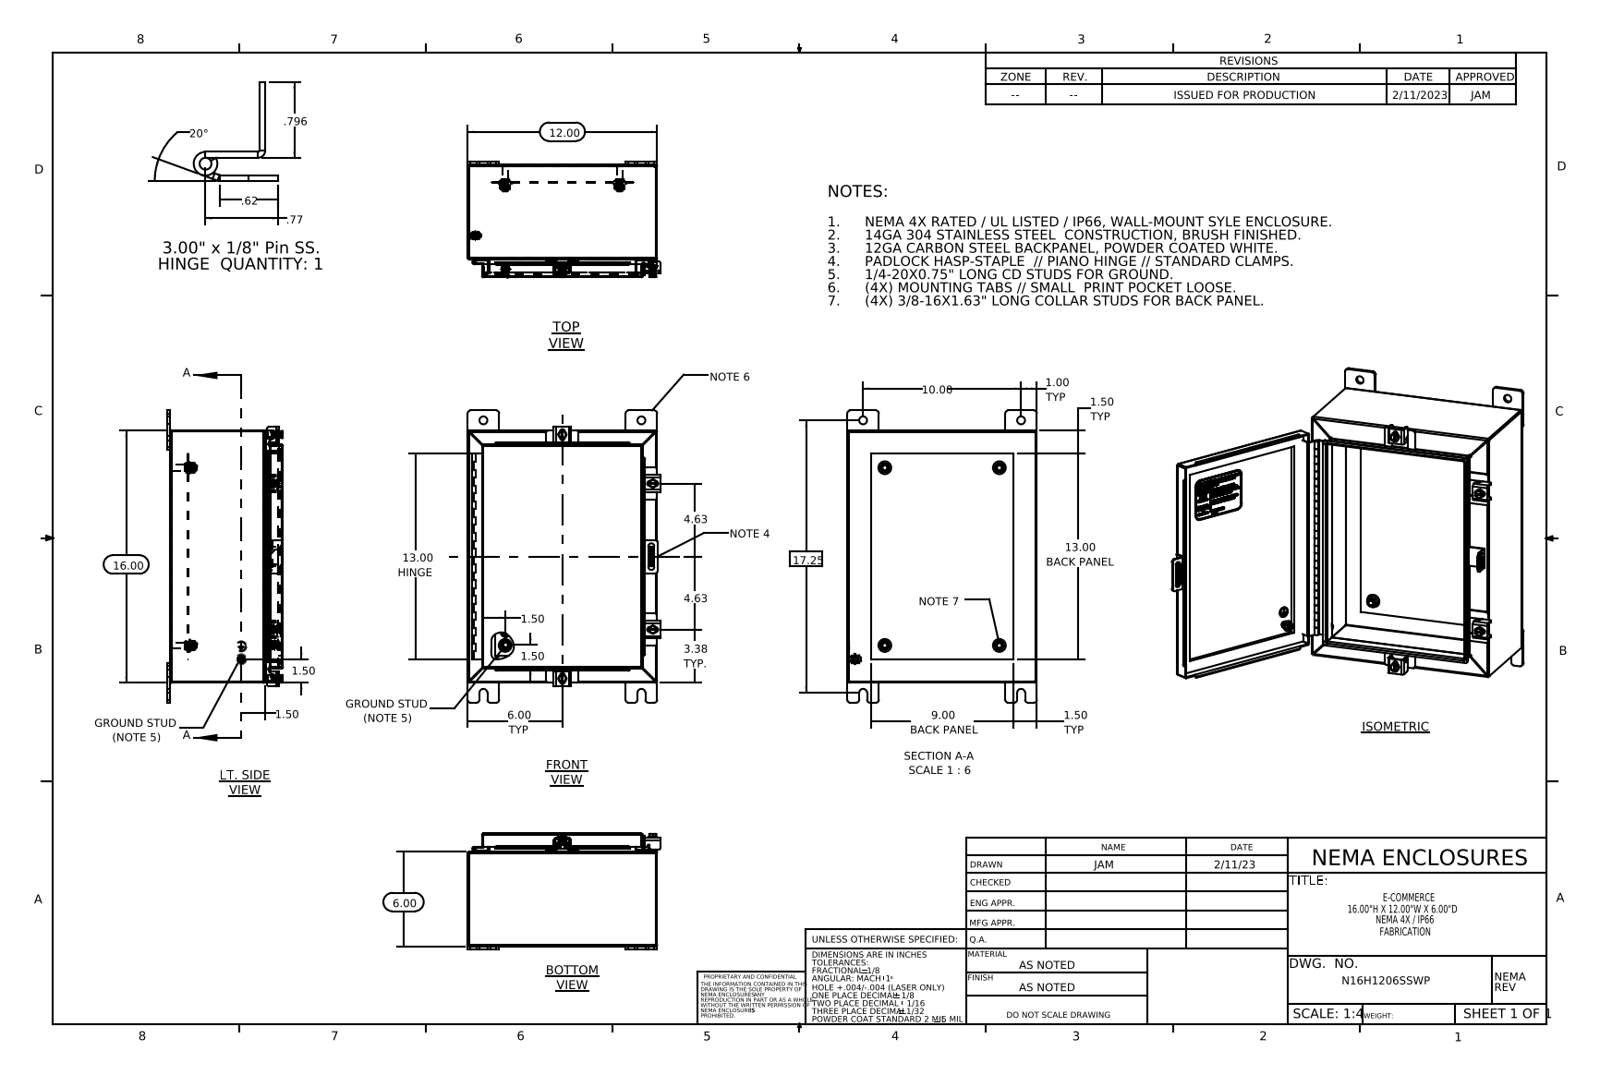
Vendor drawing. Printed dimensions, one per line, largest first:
20°
17.25
16.00
13.00 HINGE
13.00 BACK PANEL
12.00
10.00
9.00 BACK PANEL
6.00 TYP
6.00
4.63
4.63
3.38 TYP.
1.50
1.50
1.50
1.50
1.50 TYP
1.50 TYP
1.00 TYP
.796
.77
.62
